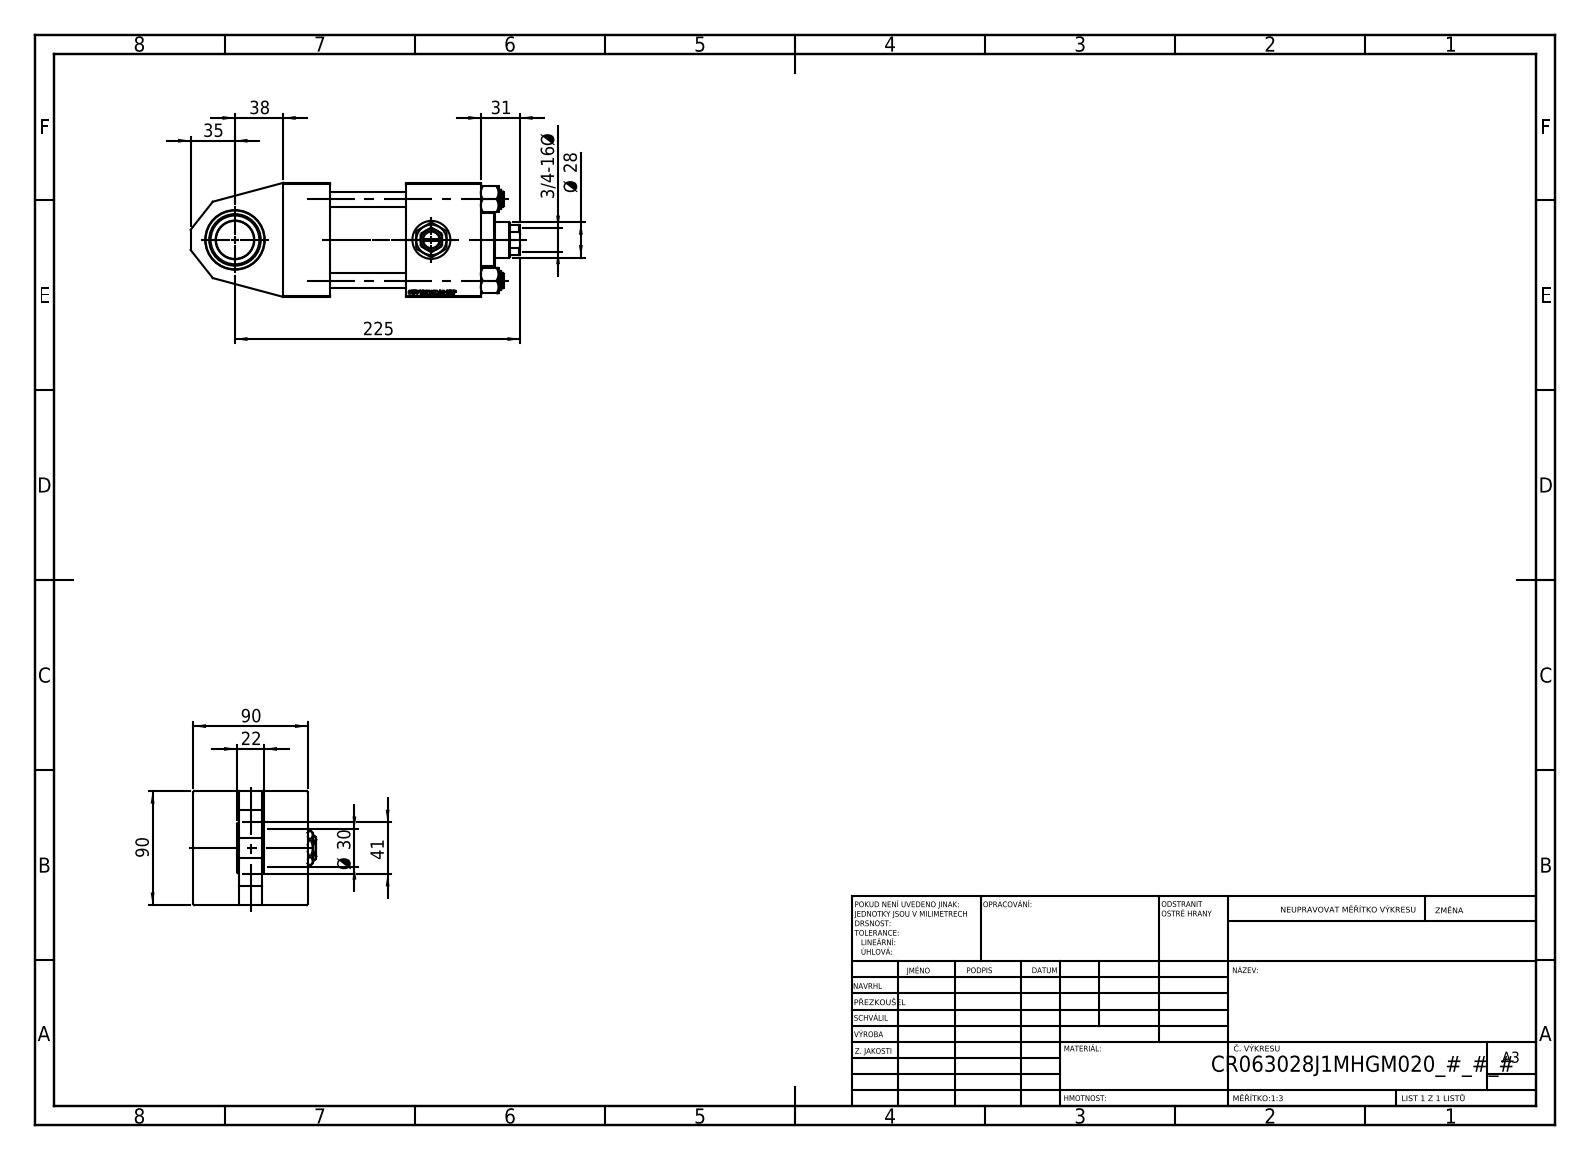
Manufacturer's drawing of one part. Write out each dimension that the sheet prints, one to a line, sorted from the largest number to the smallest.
225
90
90
41
38
35
31
Ø 30
Ø 28
22
3/4-16 Ø
